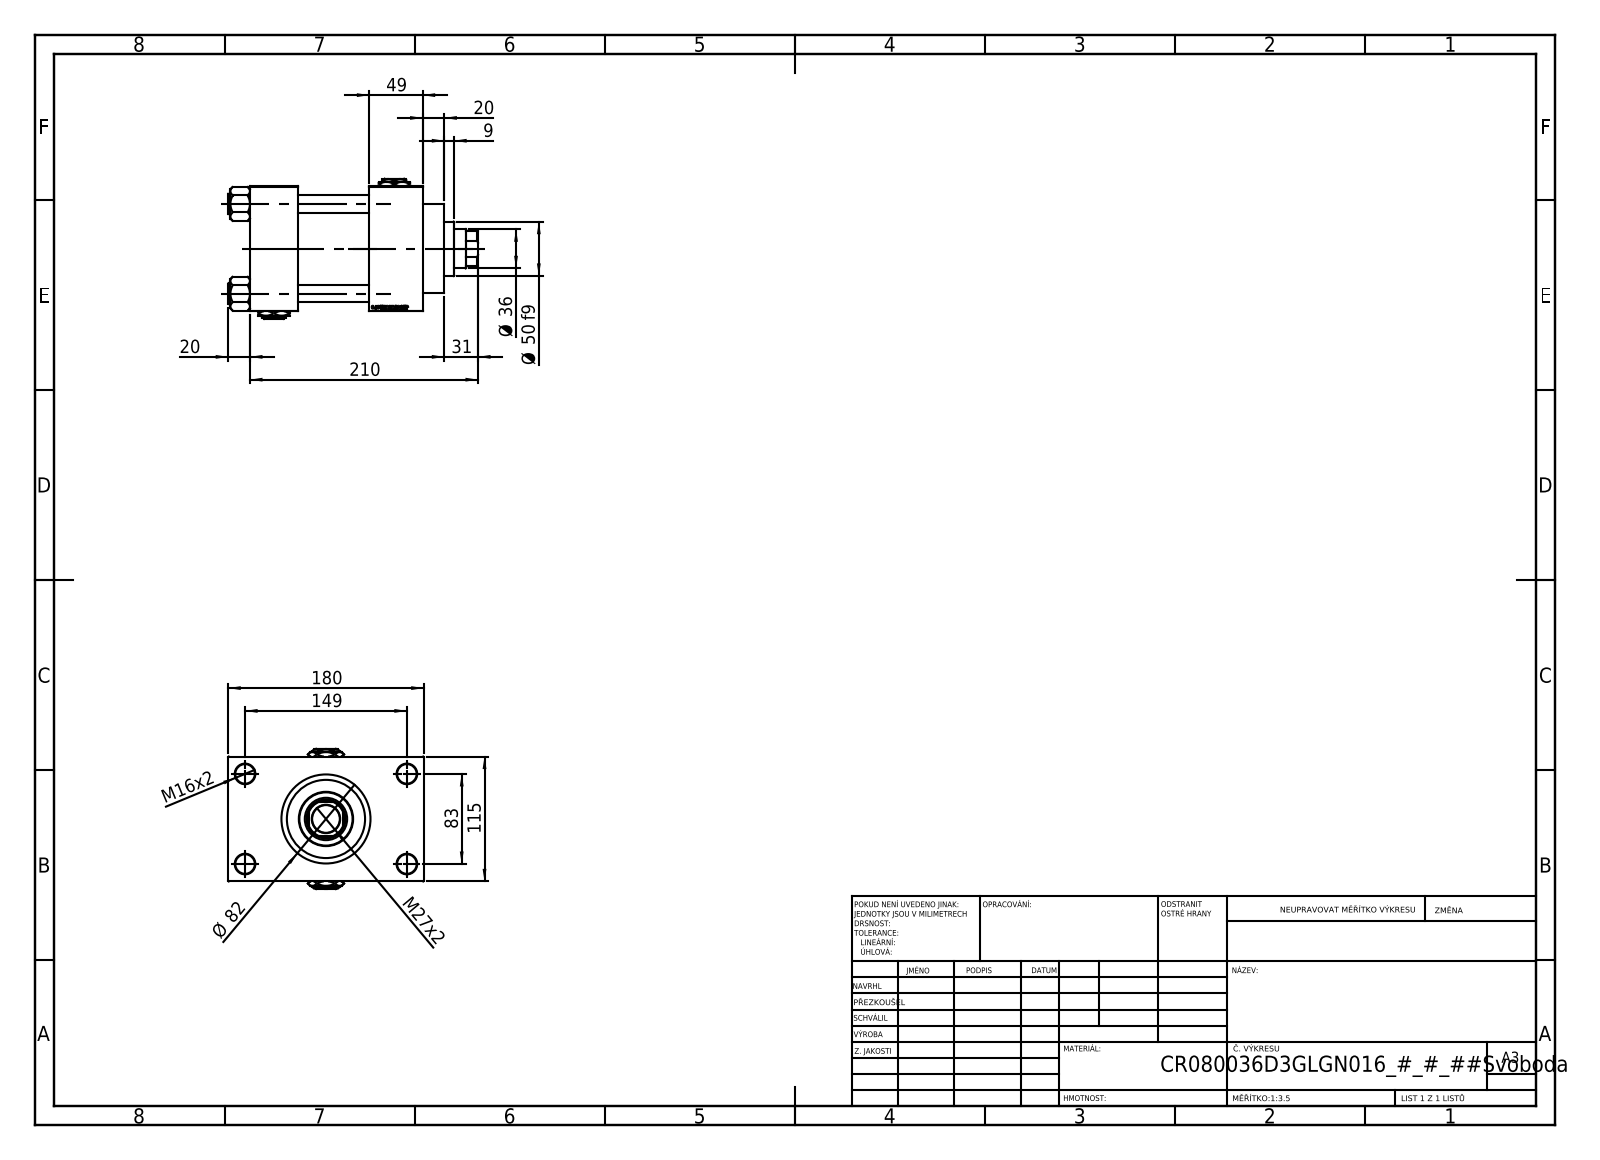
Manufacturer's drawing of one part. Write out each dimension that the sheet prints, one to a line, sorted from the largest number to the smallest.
210
180
149
115
83
Ø 82
Ø 50 f9
49
Ø 36
31
M27x2
20
20
M16x2
9
